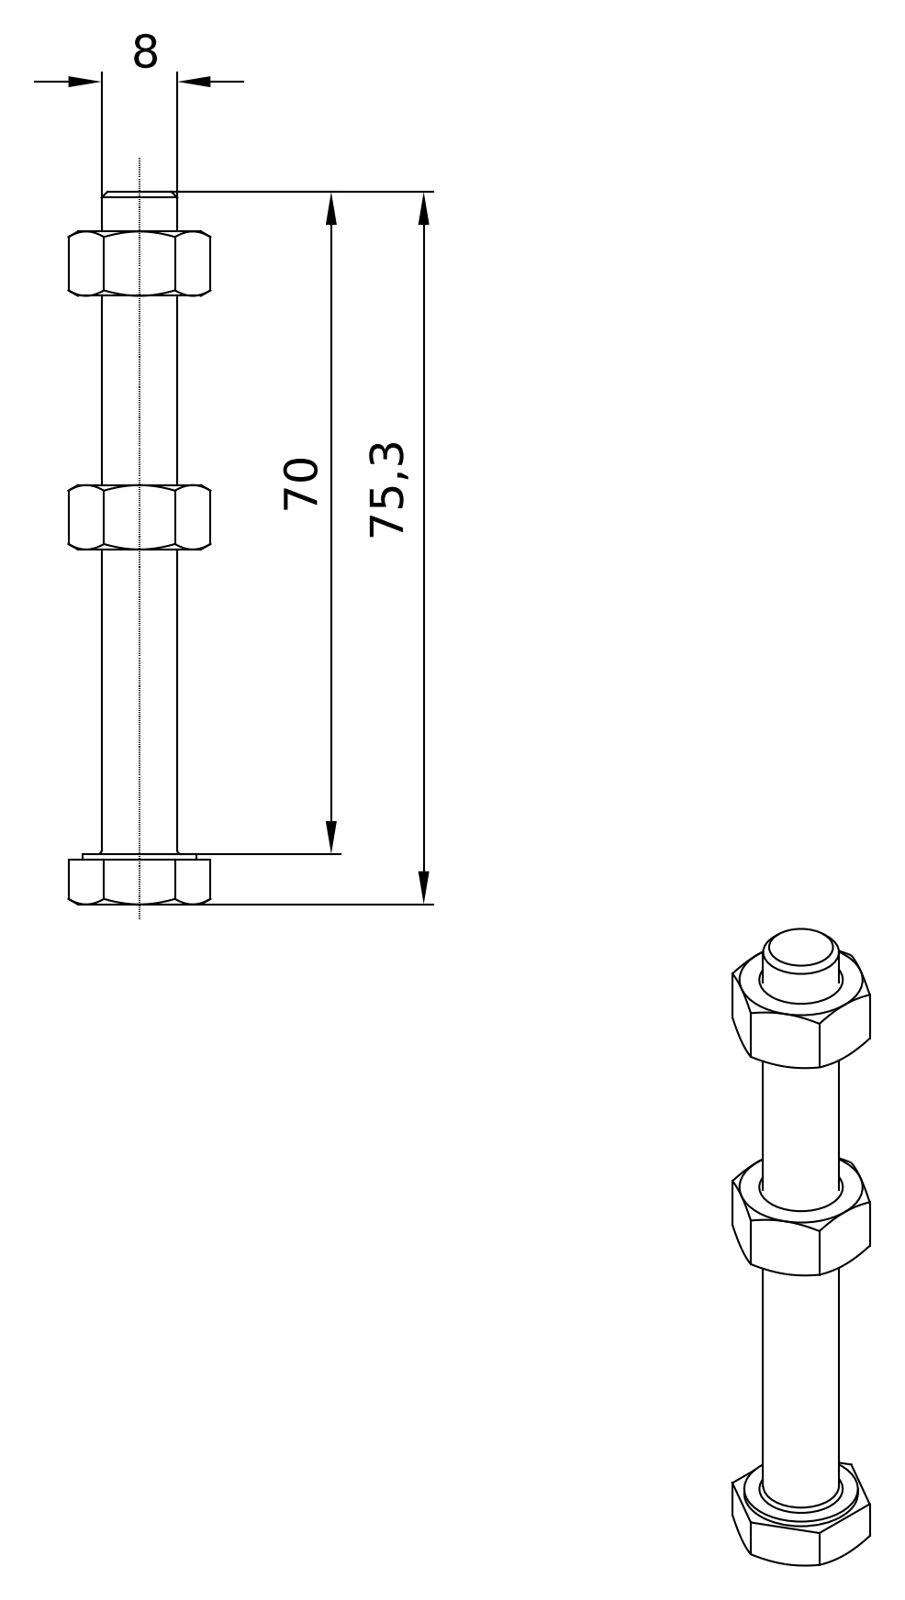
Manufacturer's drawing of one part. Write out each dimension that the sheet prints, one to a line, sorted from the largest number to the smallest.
75,3
70
8
